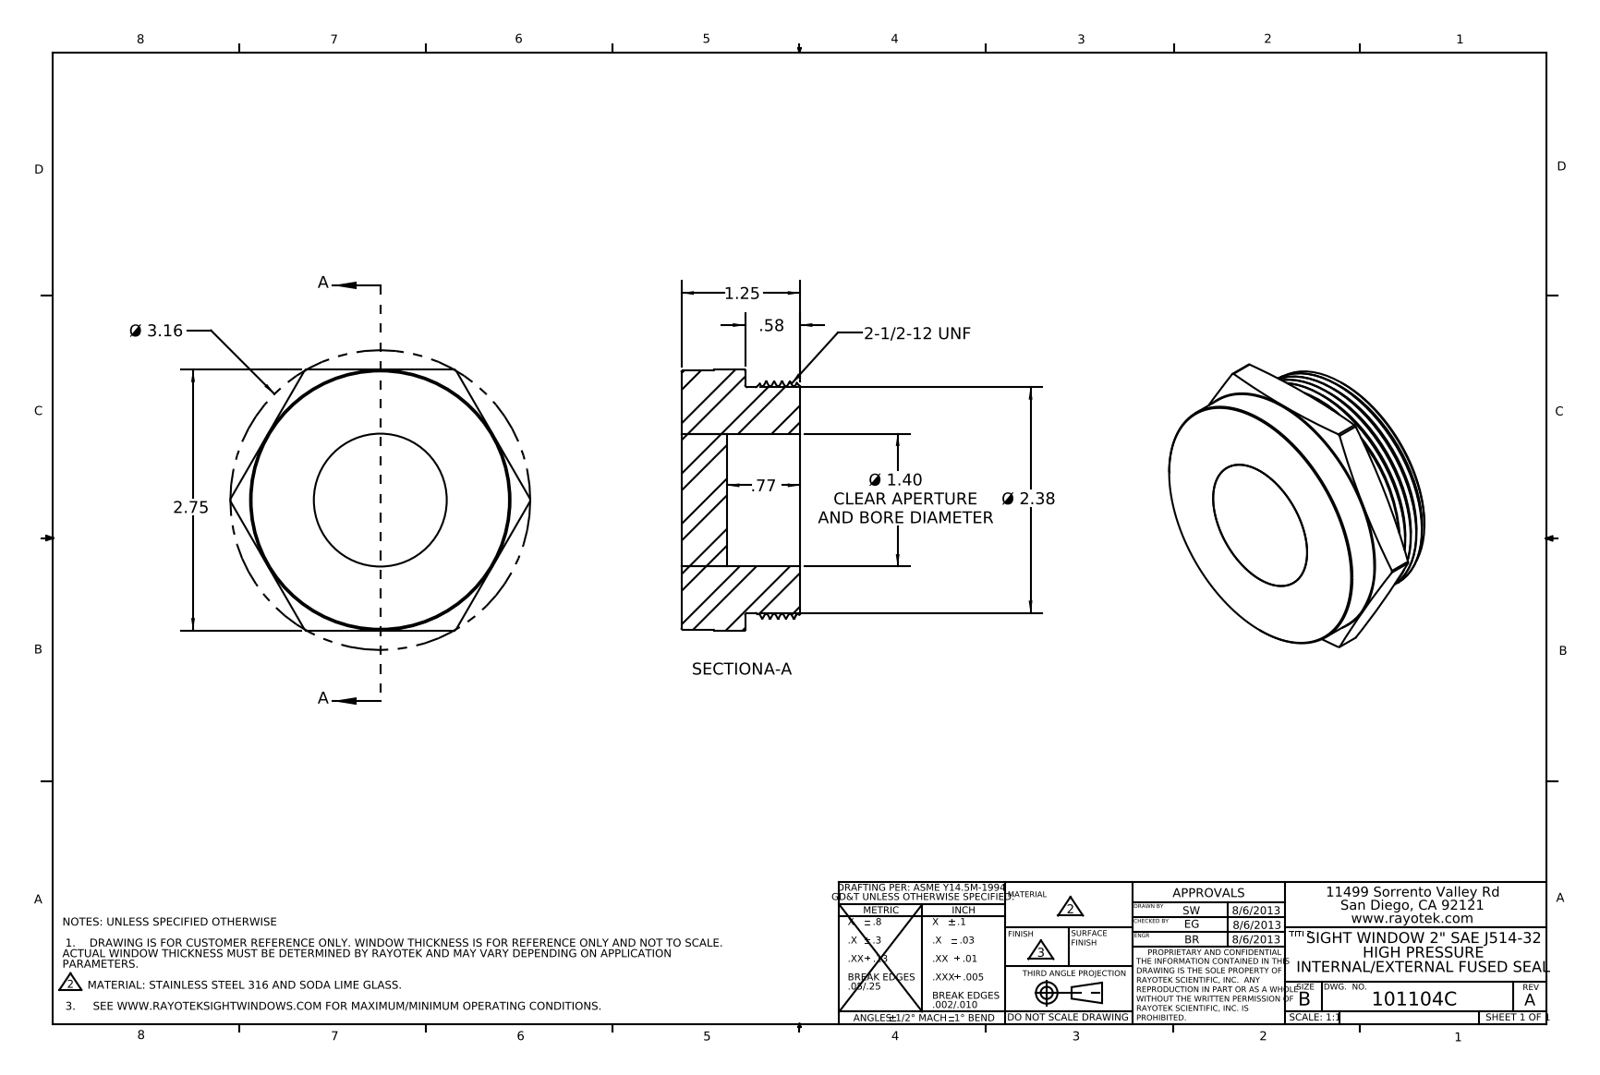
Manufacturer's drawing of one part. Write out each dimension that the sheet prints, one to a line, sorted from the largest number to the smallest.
Ø 3.16
2.75
Ø 2.38
Ø 1.40 CLEAR APERTURE AND BORE DIAMETER
1.25
.77
.58
